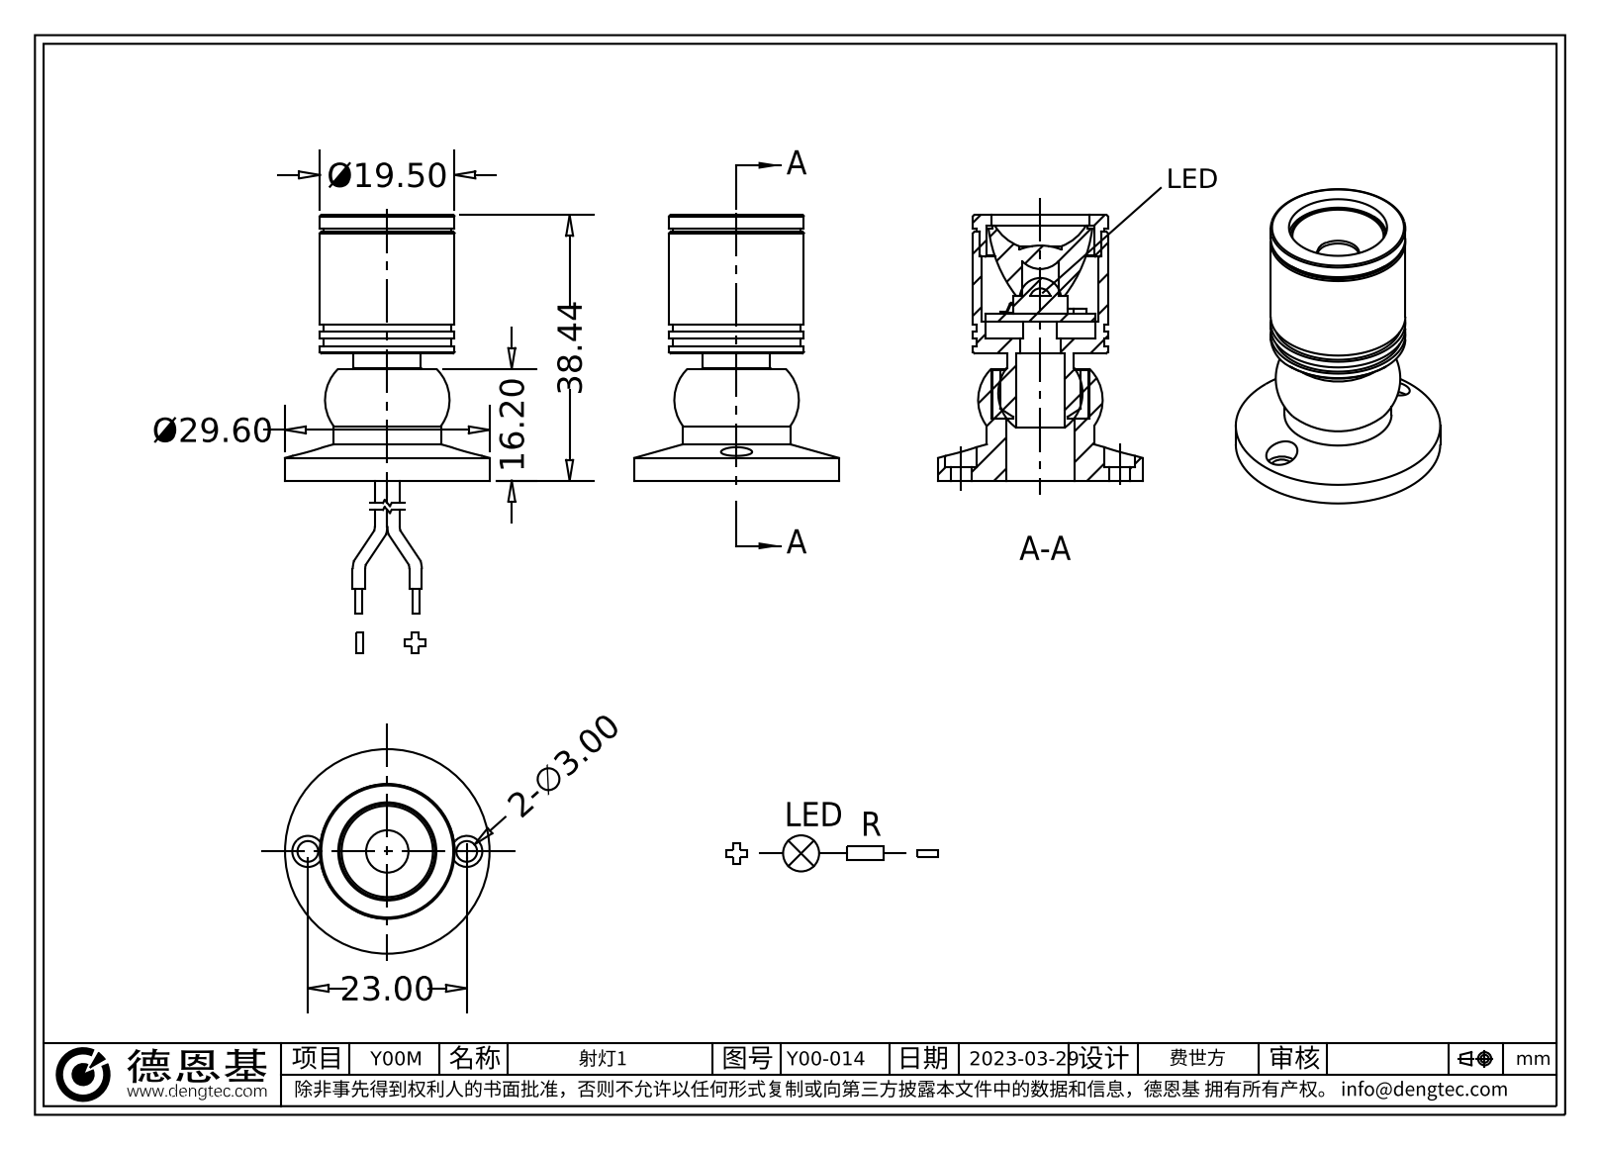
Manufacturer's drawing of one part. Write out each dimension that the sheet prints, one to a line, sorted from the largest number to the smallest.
38.44
Ø29.60
23.00
Ø19.50
16.20
2-∅3.00
